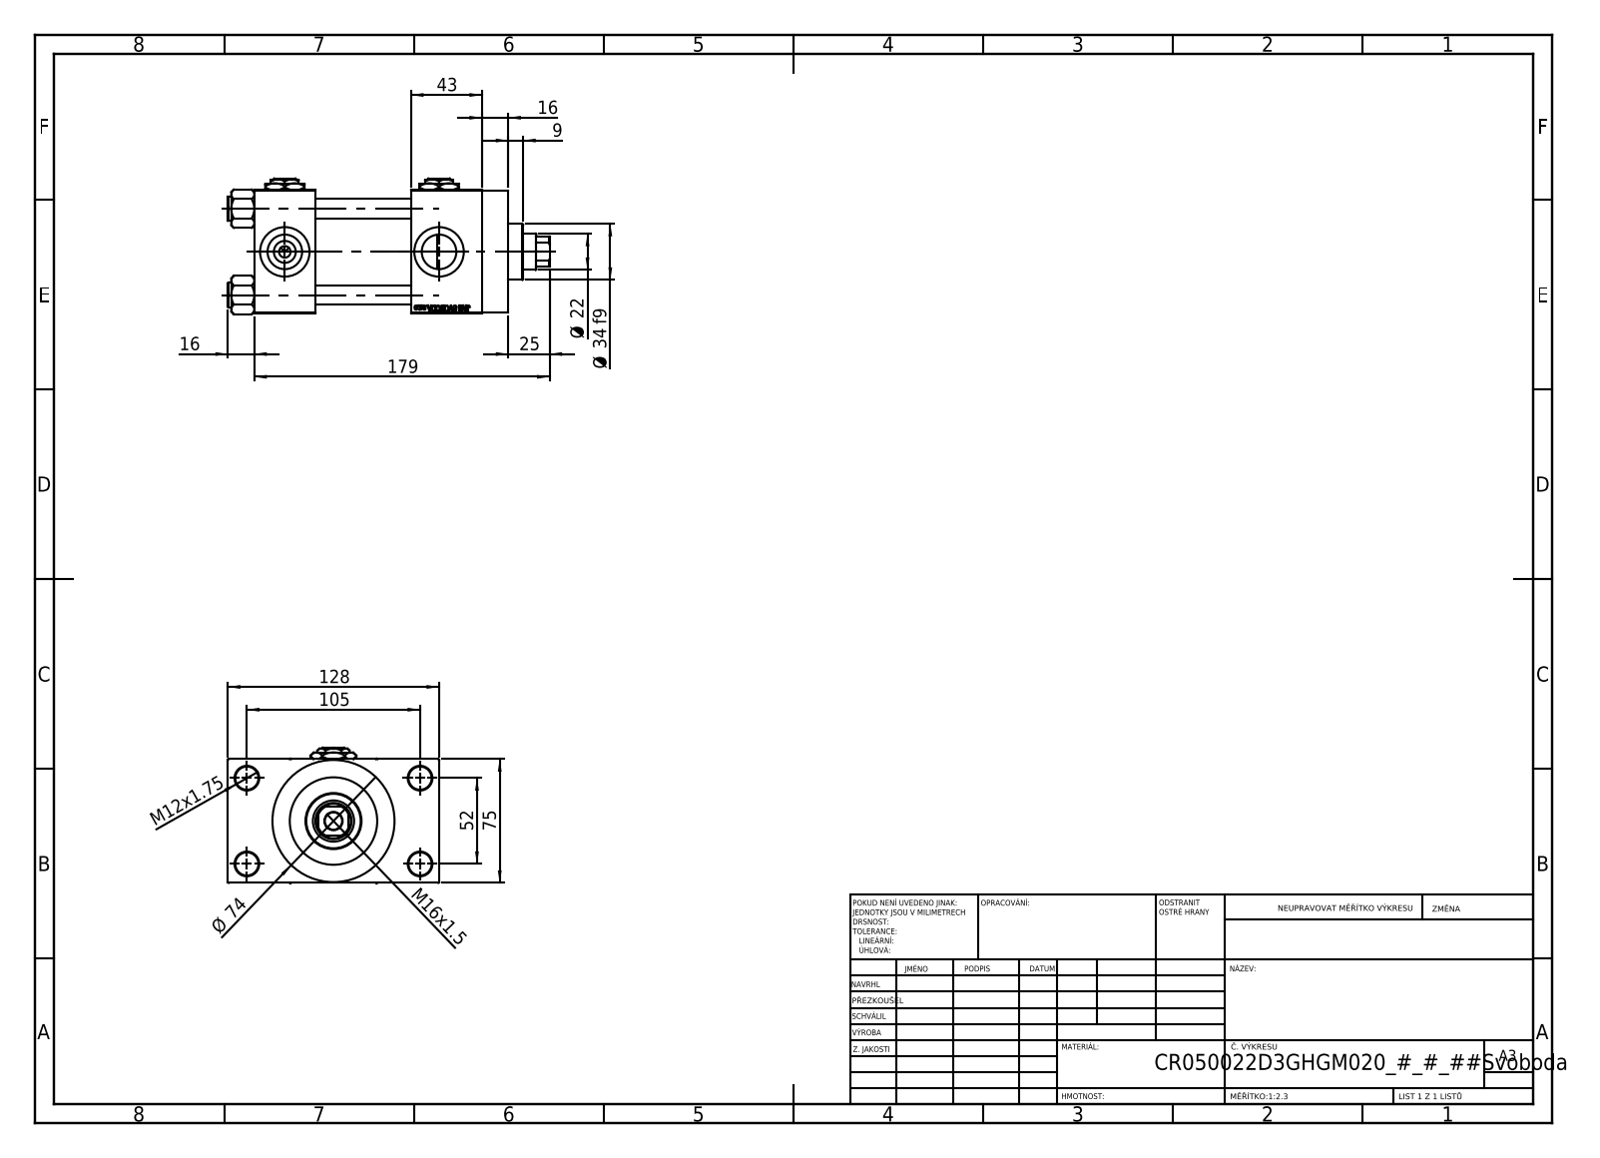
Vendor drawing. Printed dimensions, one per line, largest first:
179
128
105
75
Ø 74
52
43
Ø 34 f9
25
Ø 22
16
16
M16x1.5
M12x1.75
9
